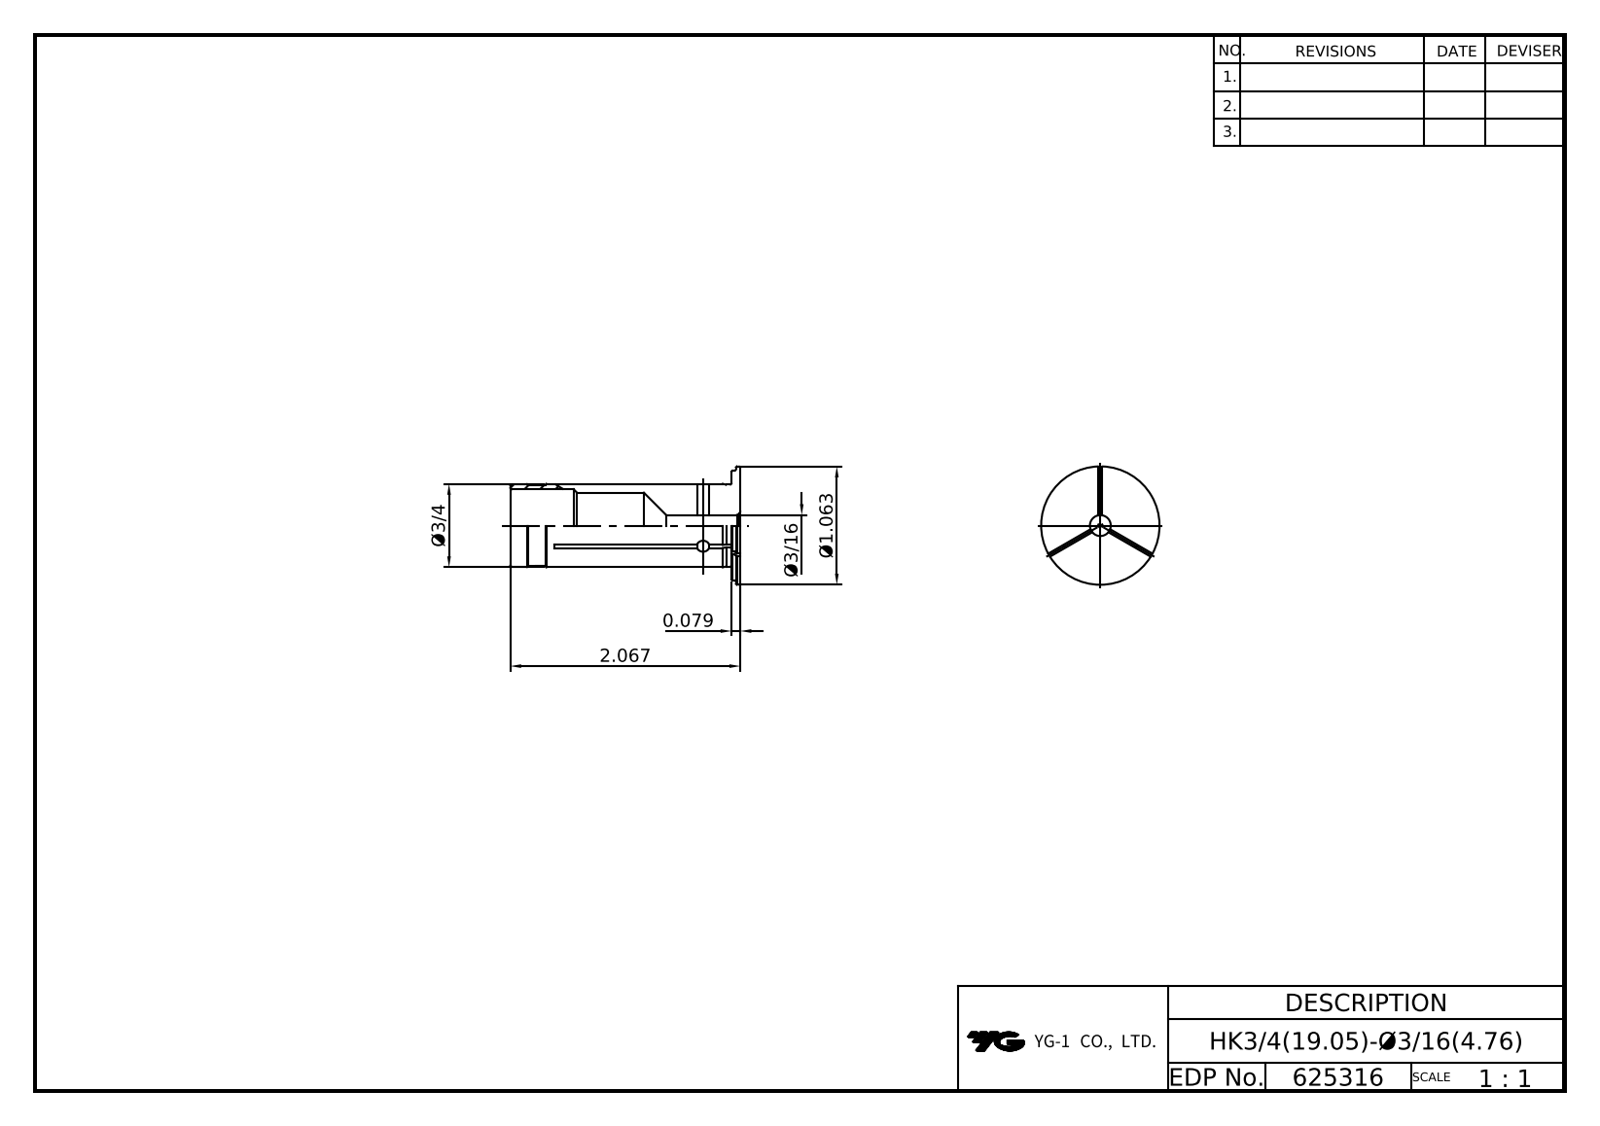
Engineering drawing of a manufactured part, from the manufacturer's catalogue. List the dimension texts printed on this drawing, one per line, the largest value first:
2.067
Ø1.063
Ø3/4
0.079
